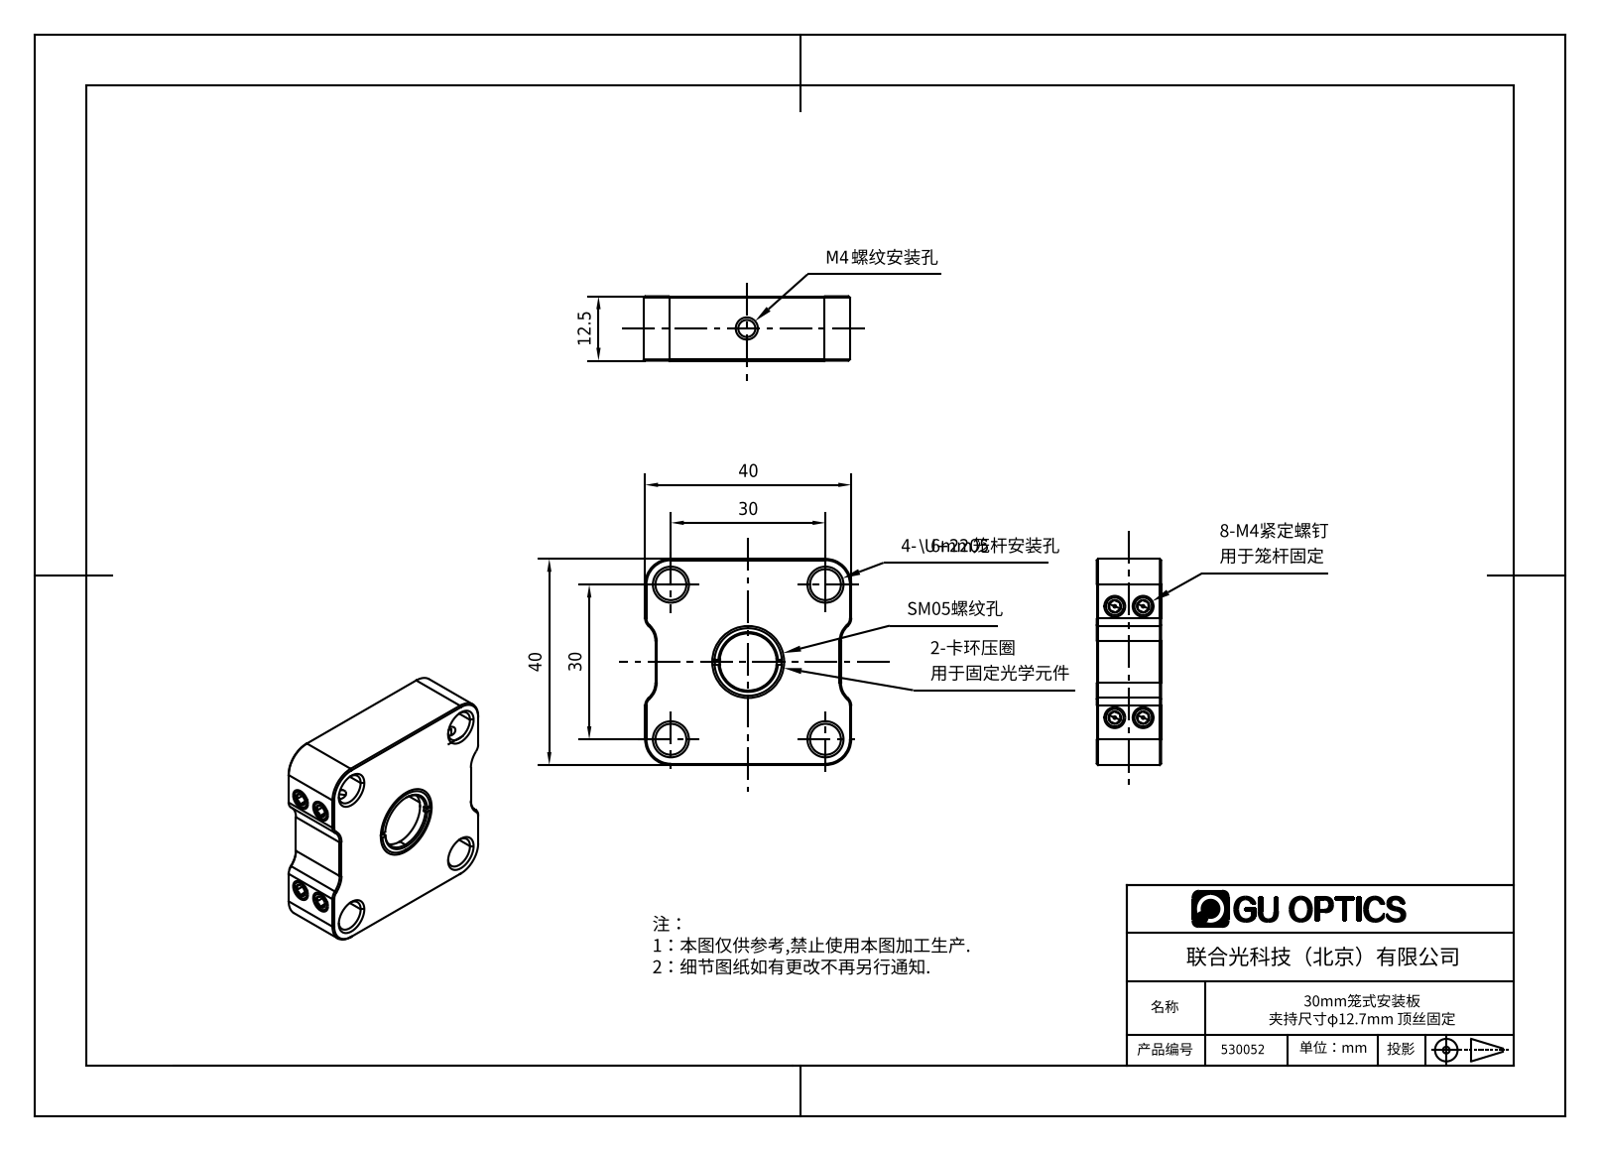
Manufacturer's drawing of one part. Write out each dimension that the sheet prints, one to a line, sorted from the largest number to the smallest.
40
40
30
30
12.5
